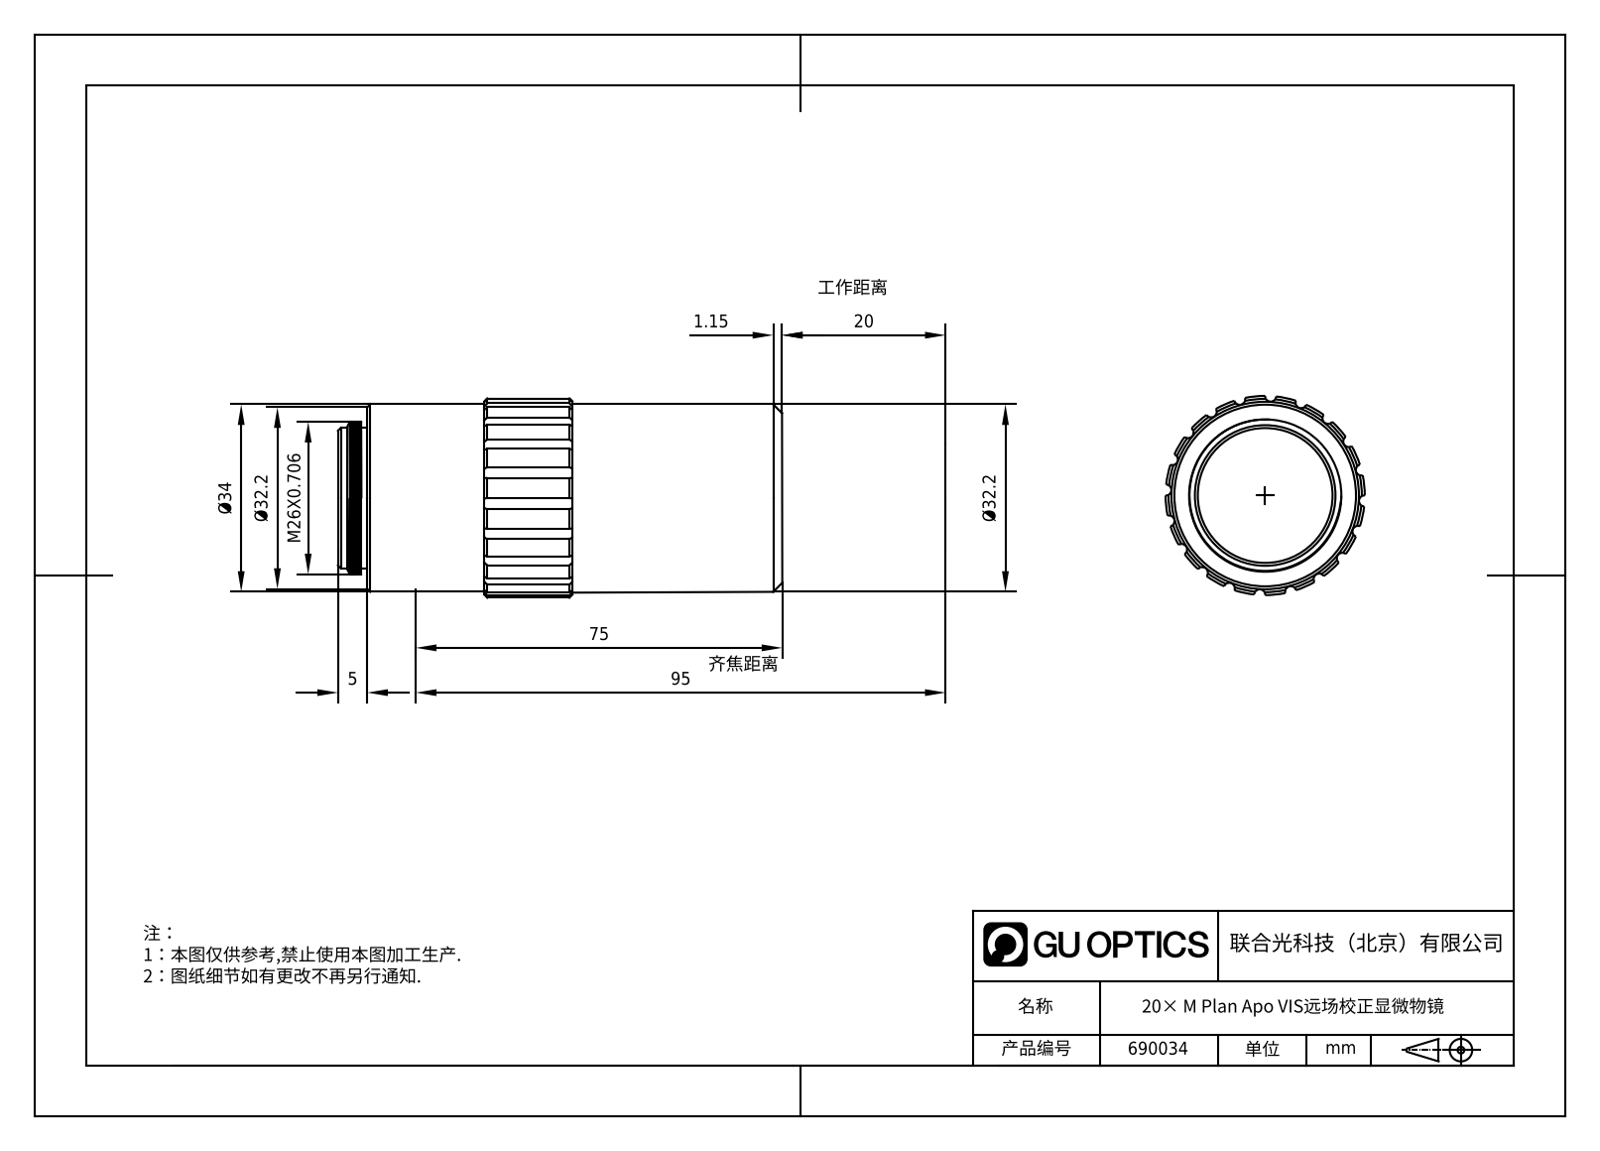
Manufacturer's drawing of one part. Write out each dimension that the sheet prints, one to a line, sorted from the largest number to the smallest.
95
75
Ø34
Ø32.2
Ø32.2
M26X0.706
20
5
1.15
